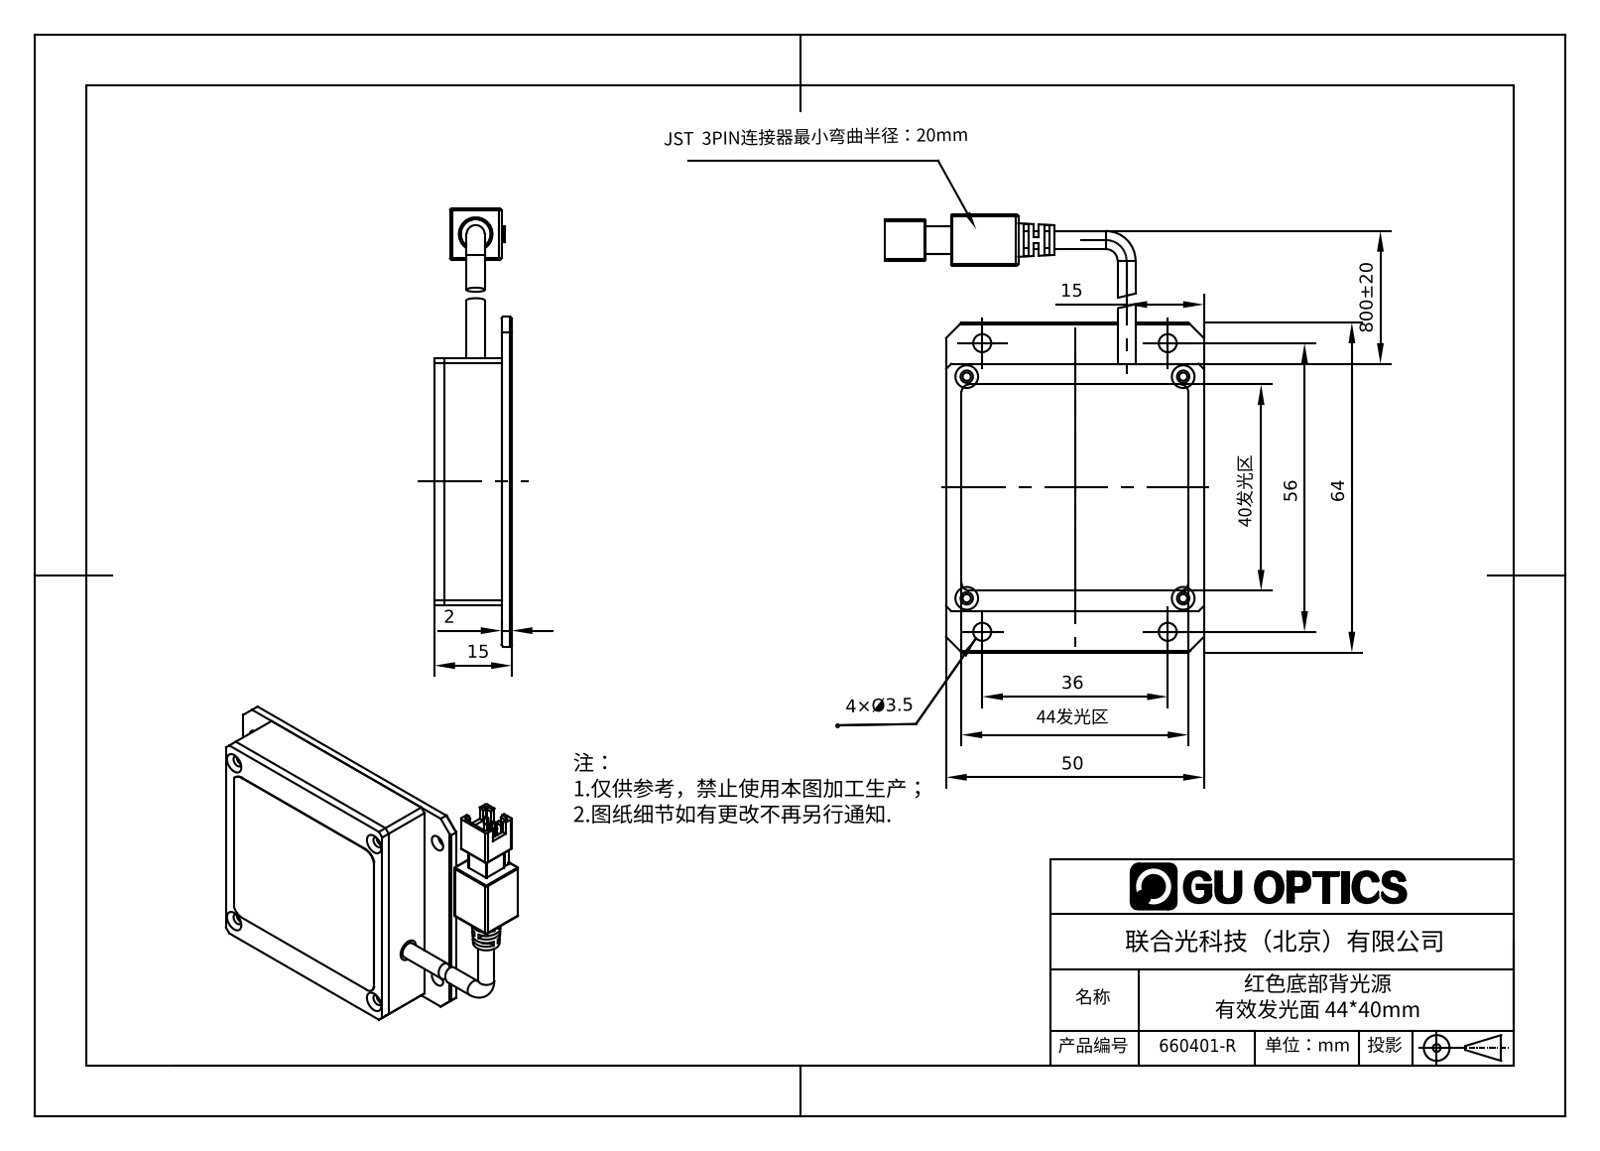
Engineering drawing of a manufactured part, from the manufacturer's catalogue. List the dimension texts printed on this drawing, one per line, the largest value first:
800±20
64
56
50
44发光区
40发光区
36
15
15
2
